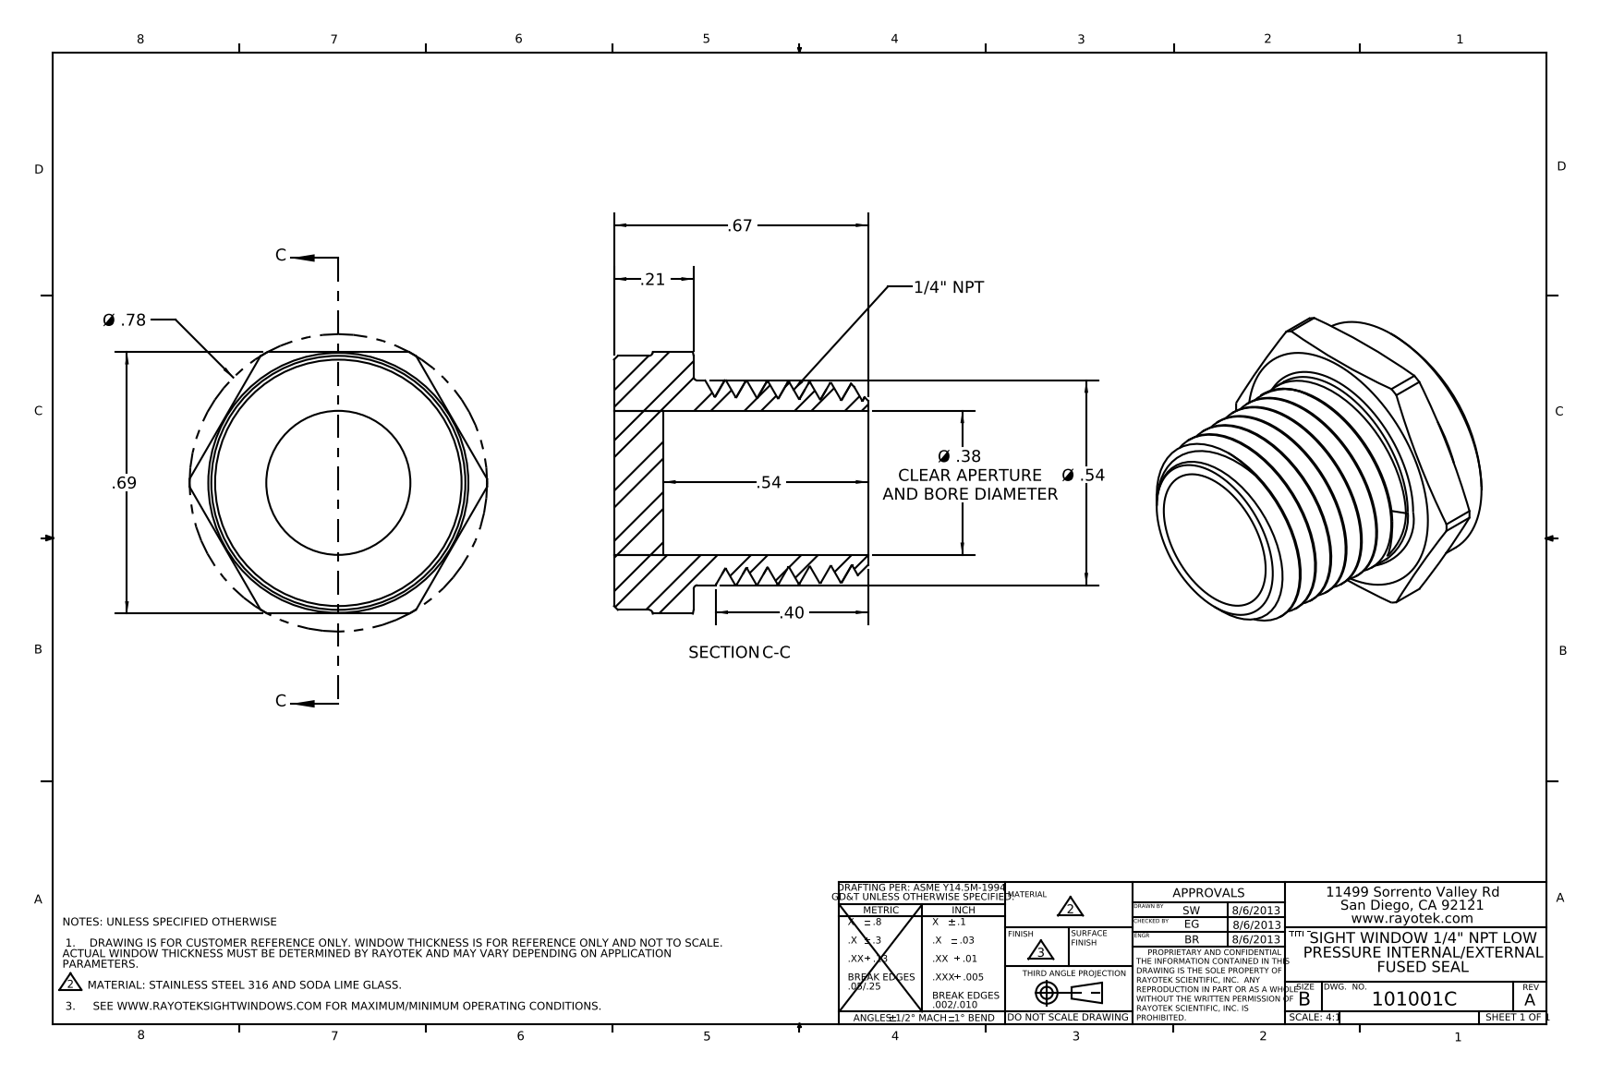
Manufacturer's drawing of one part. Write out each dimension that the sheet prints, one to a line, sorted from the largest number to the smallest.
Ø .78
.69
.67
.54
Ø .54
.40
Ø .38 CLEAR APERTURE AND BORE DIAMETER
.21
